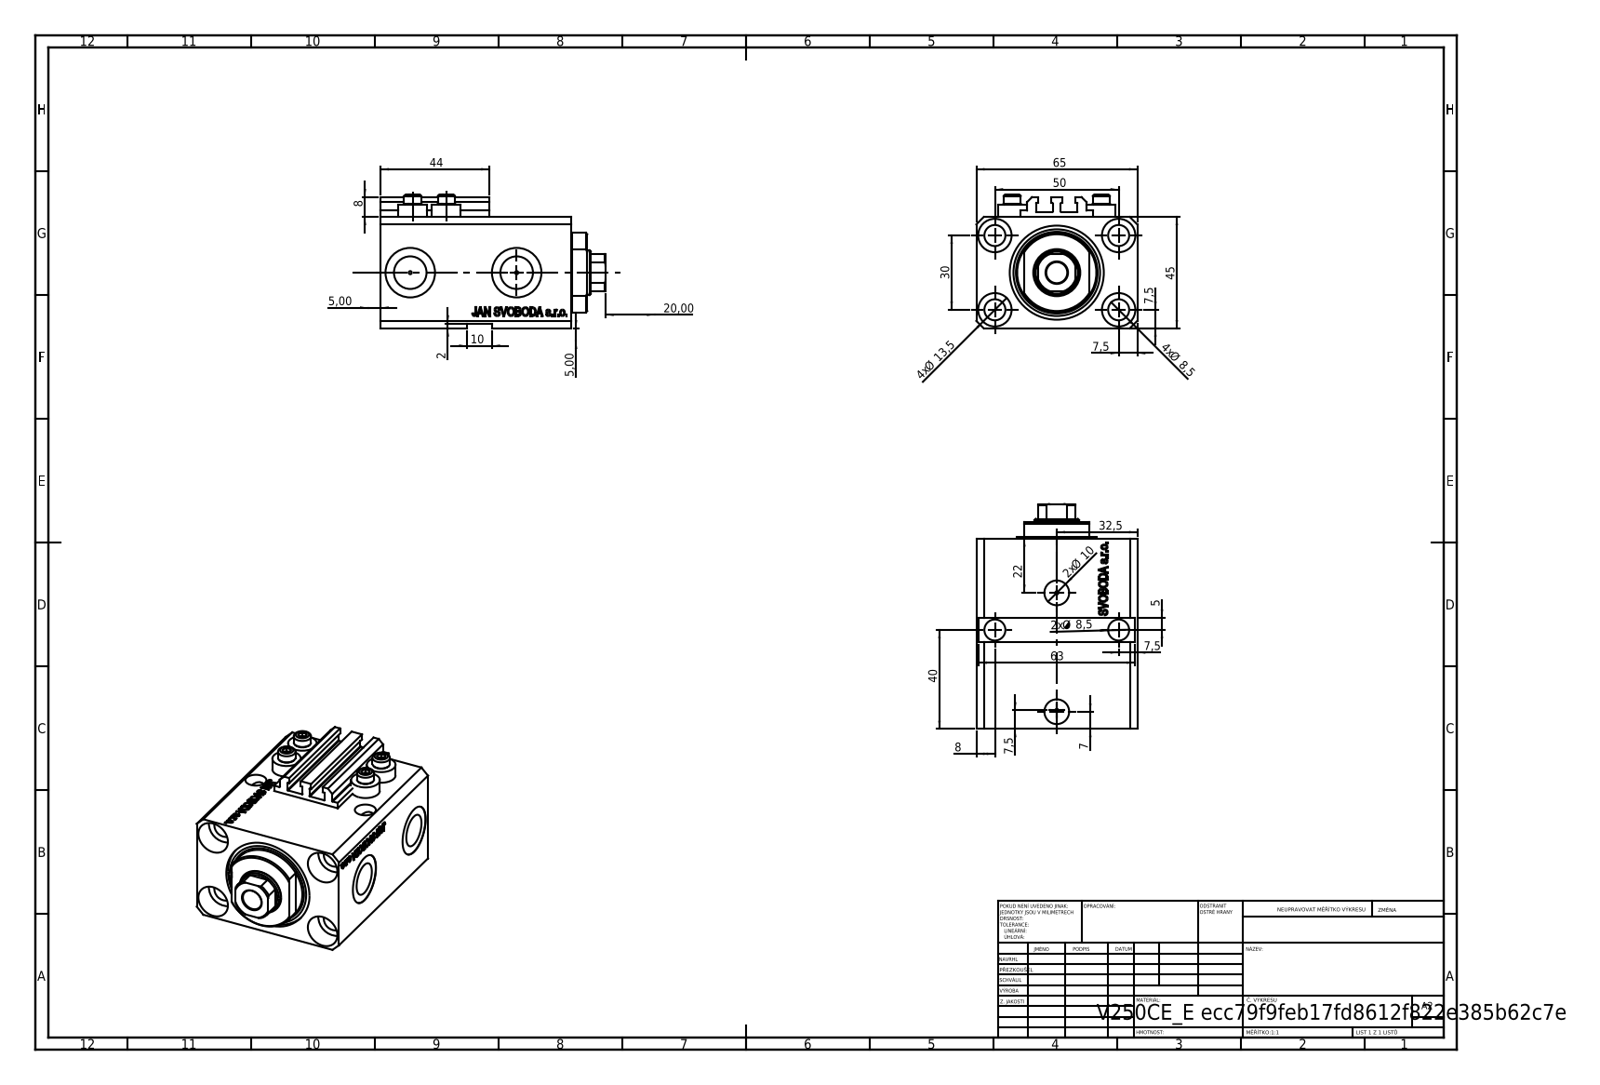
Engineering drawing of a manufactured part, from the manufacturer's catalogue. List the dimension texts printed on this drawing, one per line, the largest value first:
65
63
50
45
44
40
32,5
30
22
20,00
4x Ø 13,5
10
2x Ø 10
4x Ø 8,5
2x Ø 8,5
8
8
7,5
7,5
7,5
7,5
7
5,00
5,00
5
2
